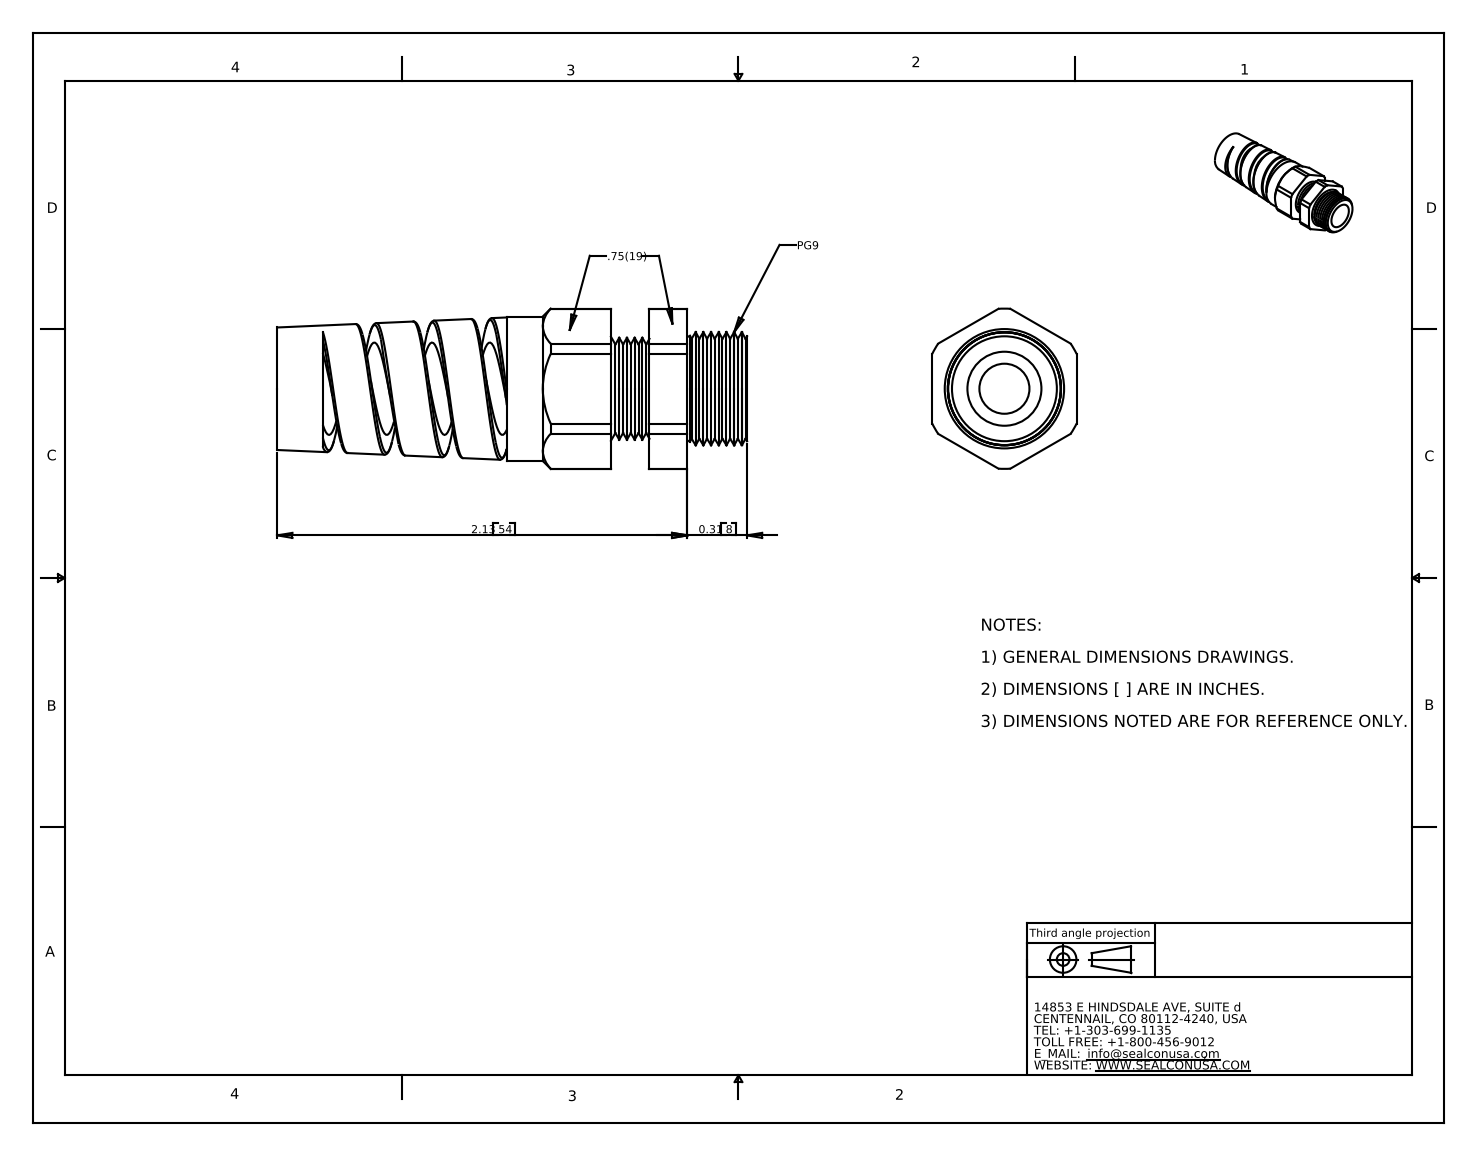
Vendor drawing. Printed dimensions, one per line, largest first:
2.13 54
0.31 8
